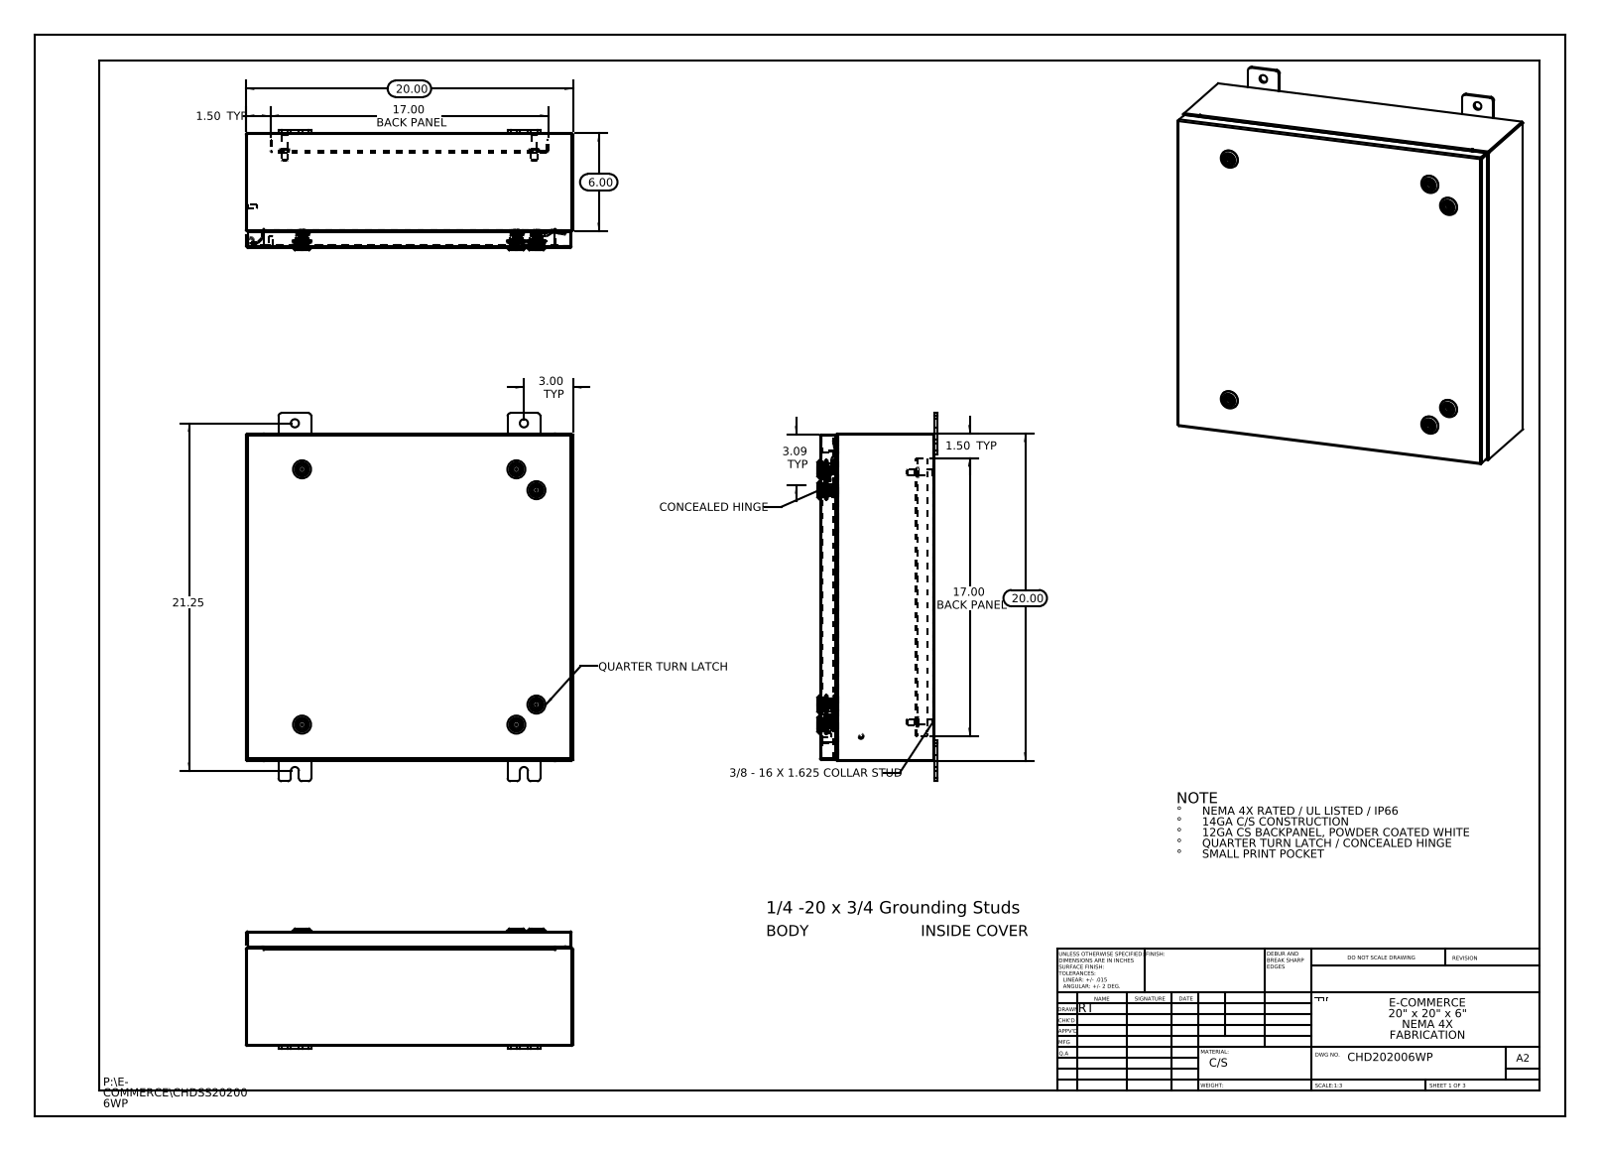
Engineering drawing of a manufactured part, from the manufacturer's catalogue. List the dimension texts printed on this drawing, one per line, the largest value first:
21.25
20.00
20.00
17.00 BACK PANEL
17.00 BACK PANEL
6.00
3.09 TYP
3.00 TYP
1.50 TYP
1.50 TYP
